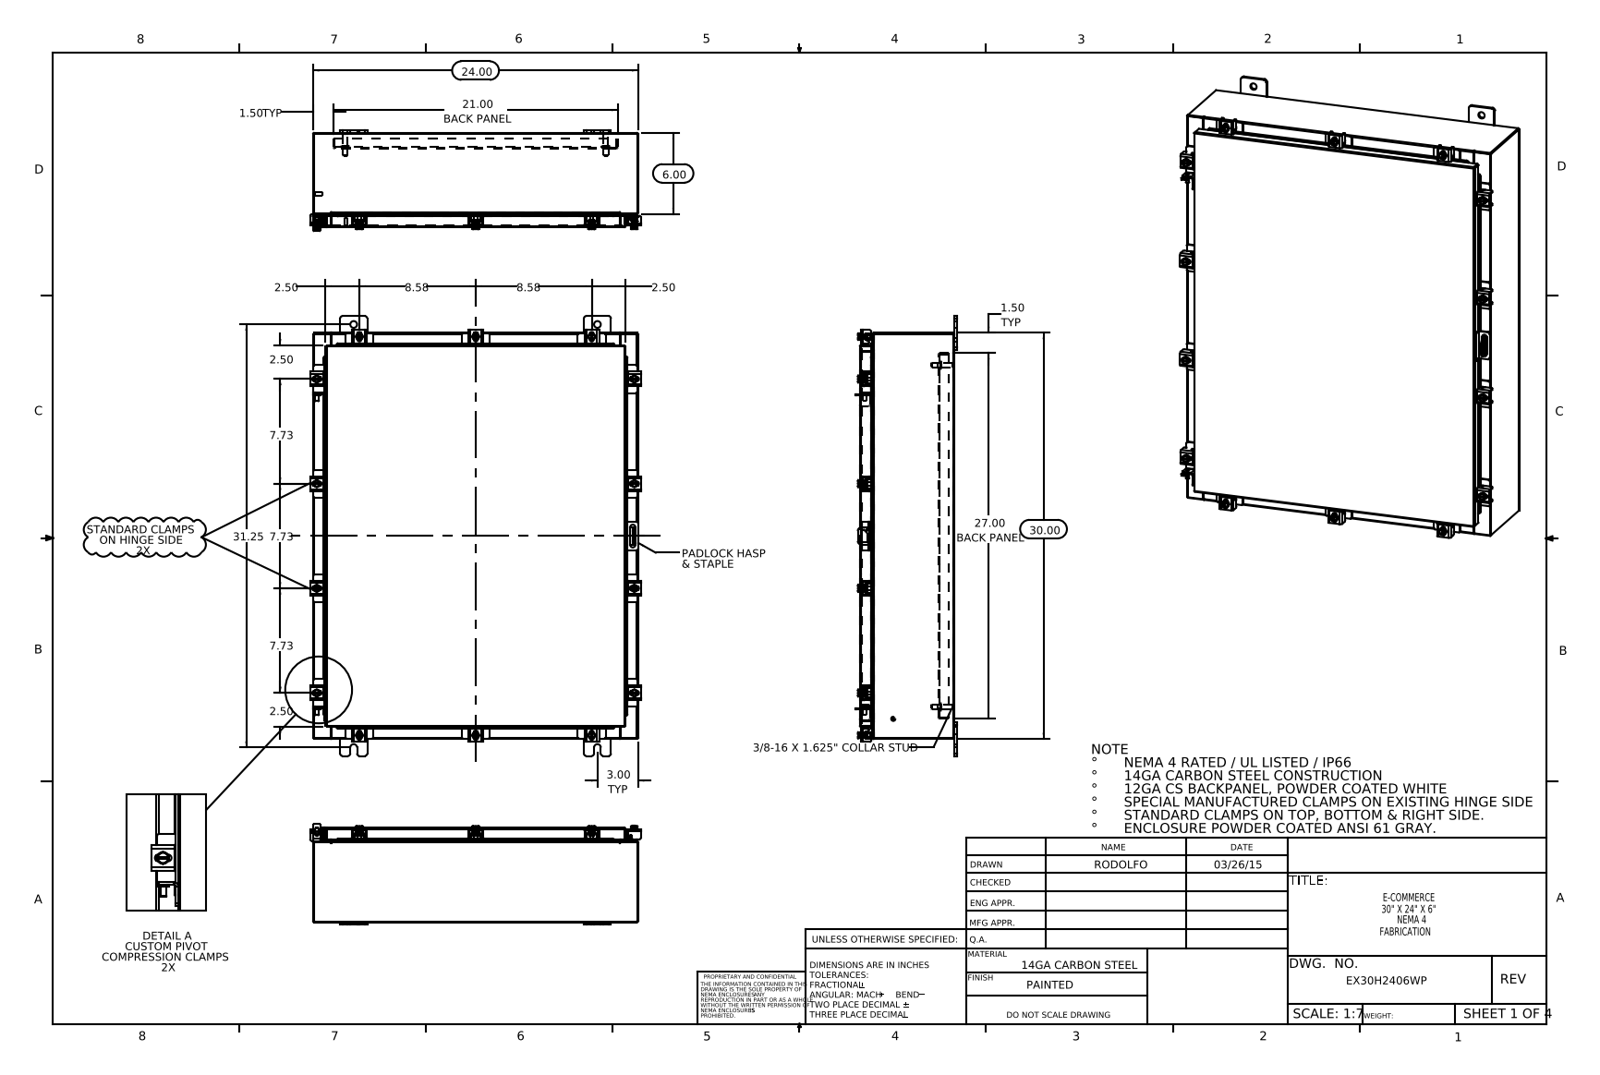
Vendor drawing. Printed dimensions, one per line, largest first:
31.25
30.00
27.00 BACK PANEL
24.00
21.00 BACK PANEL
8.58
8.58
7.73
7.73
7.73
6.00
3.00 TYP
2.50
2.50
2.50
2.50
1.50 TYP
1.50 TYP
